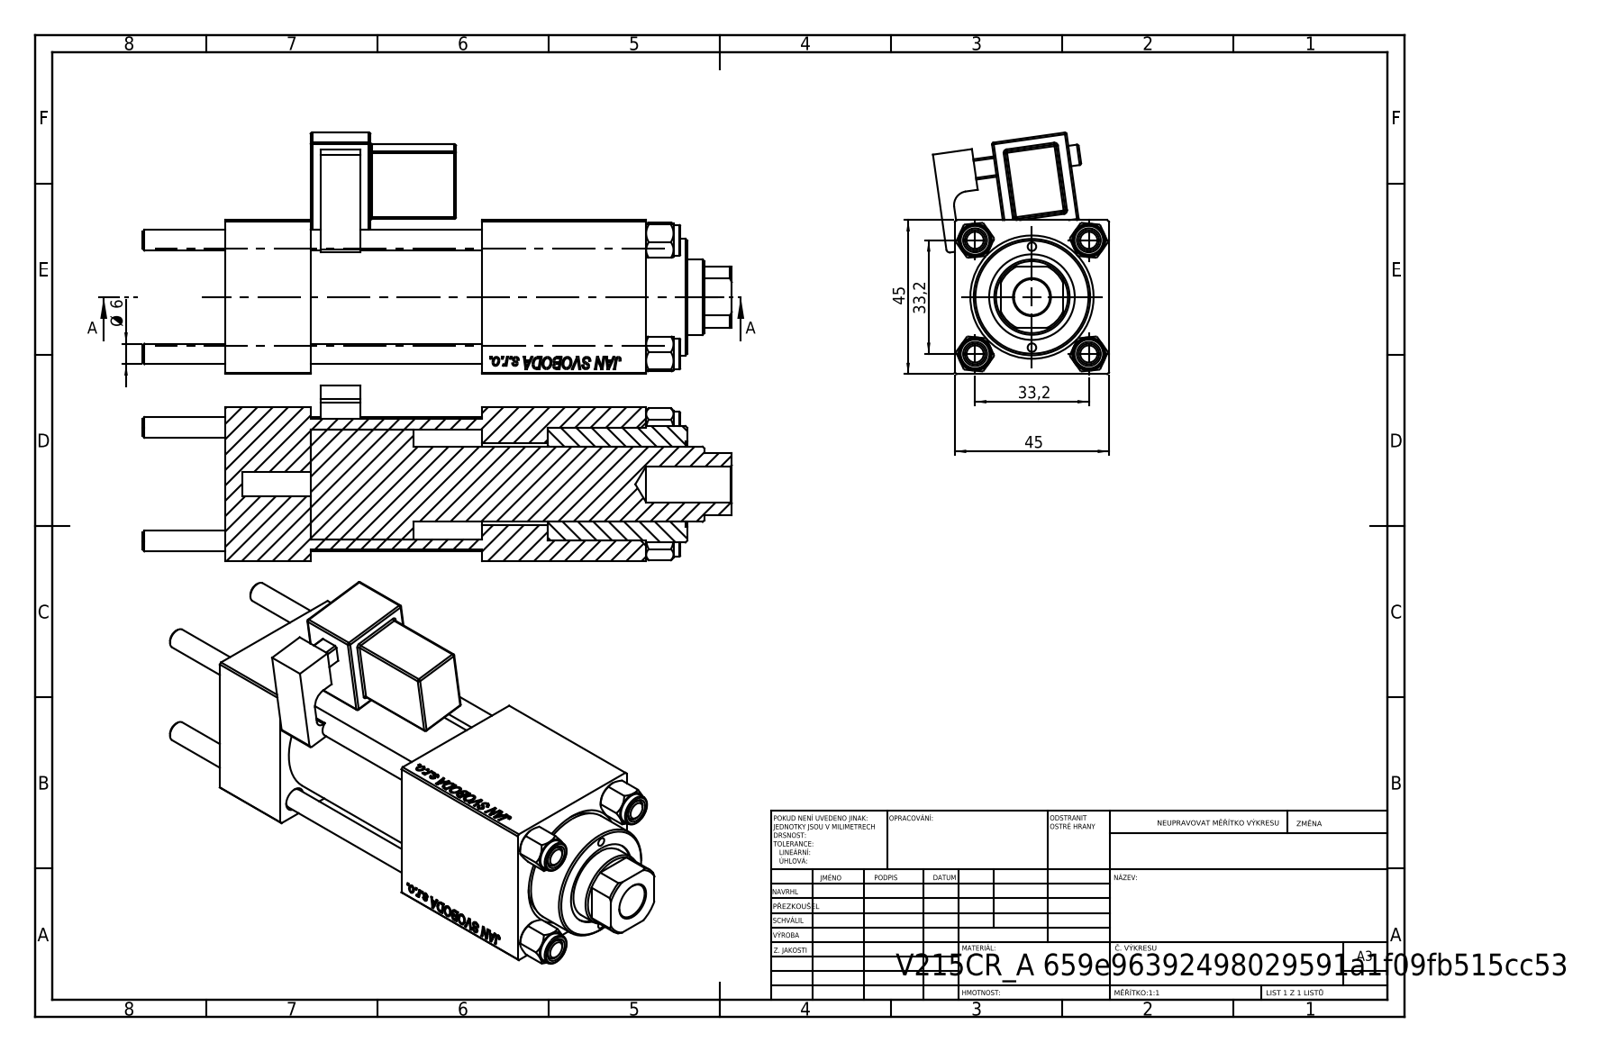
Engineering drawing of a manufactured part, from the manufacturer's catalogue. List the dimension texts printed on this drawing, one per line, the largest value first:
45
45
33,2
33,2
Ø 6
